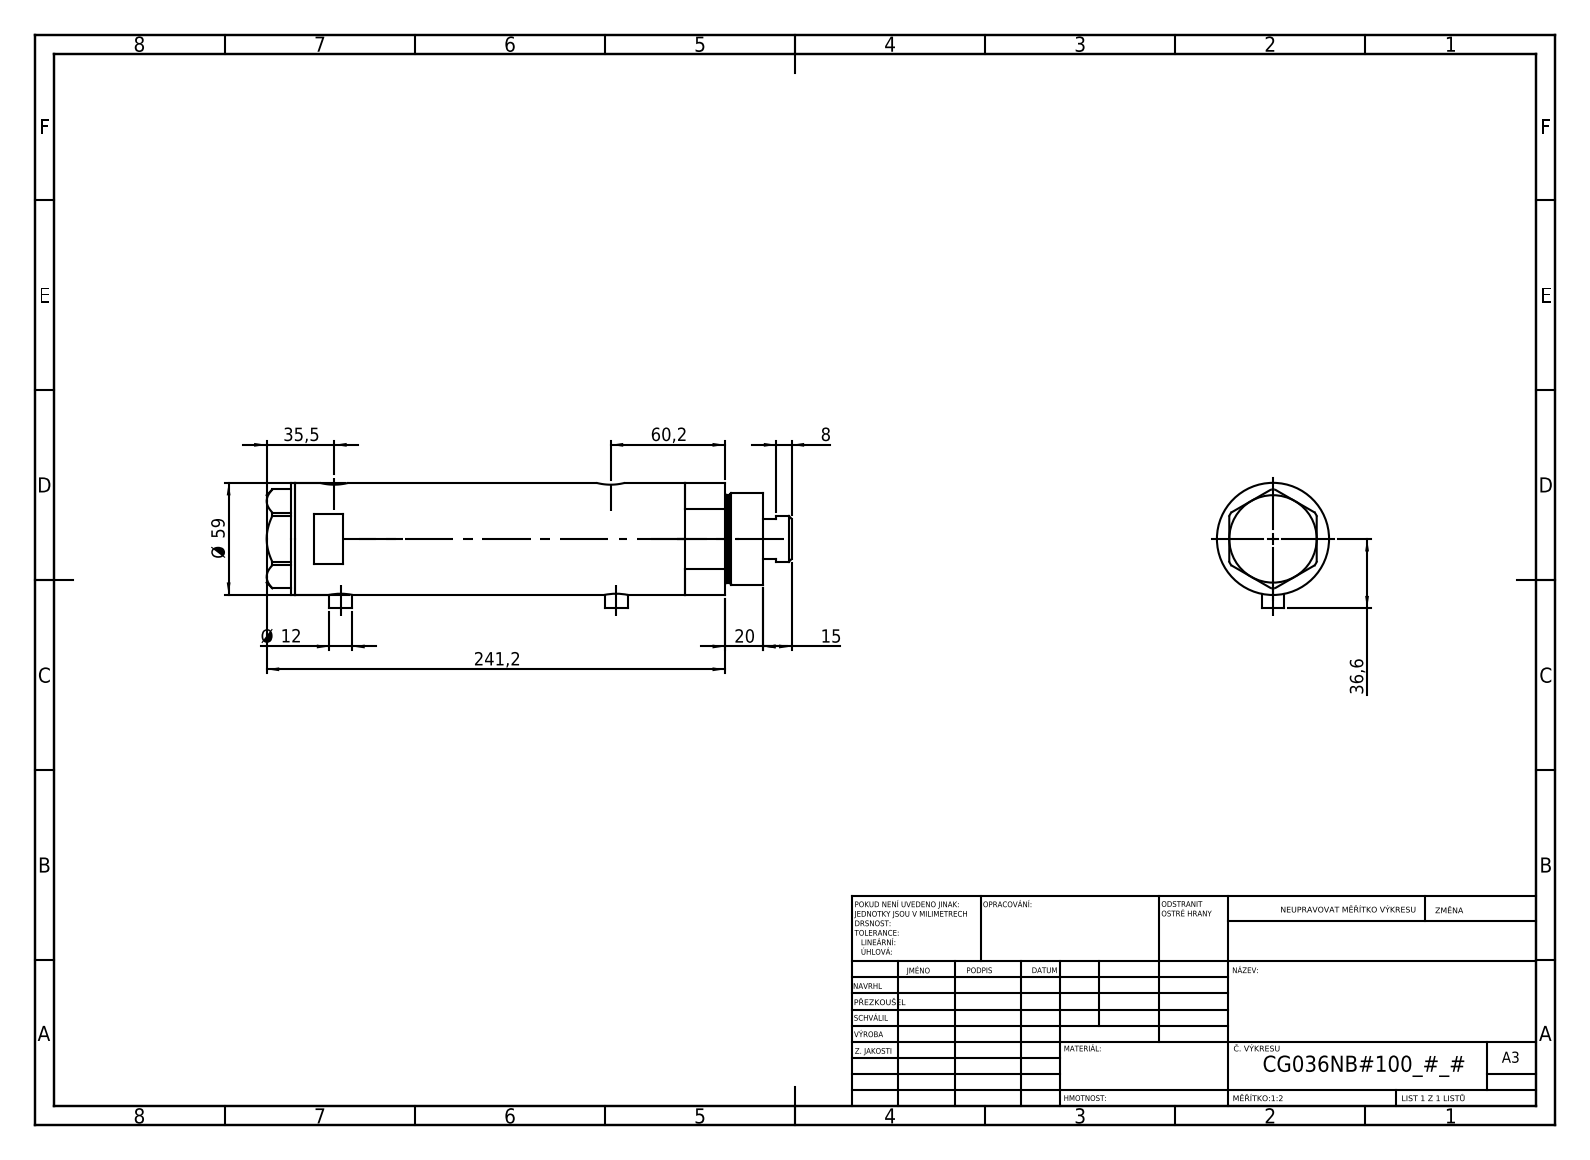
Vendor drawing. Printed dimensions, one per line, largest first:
241,2
60,2
Ø 59
36,6
35,5
20
15
Ø 12
8
